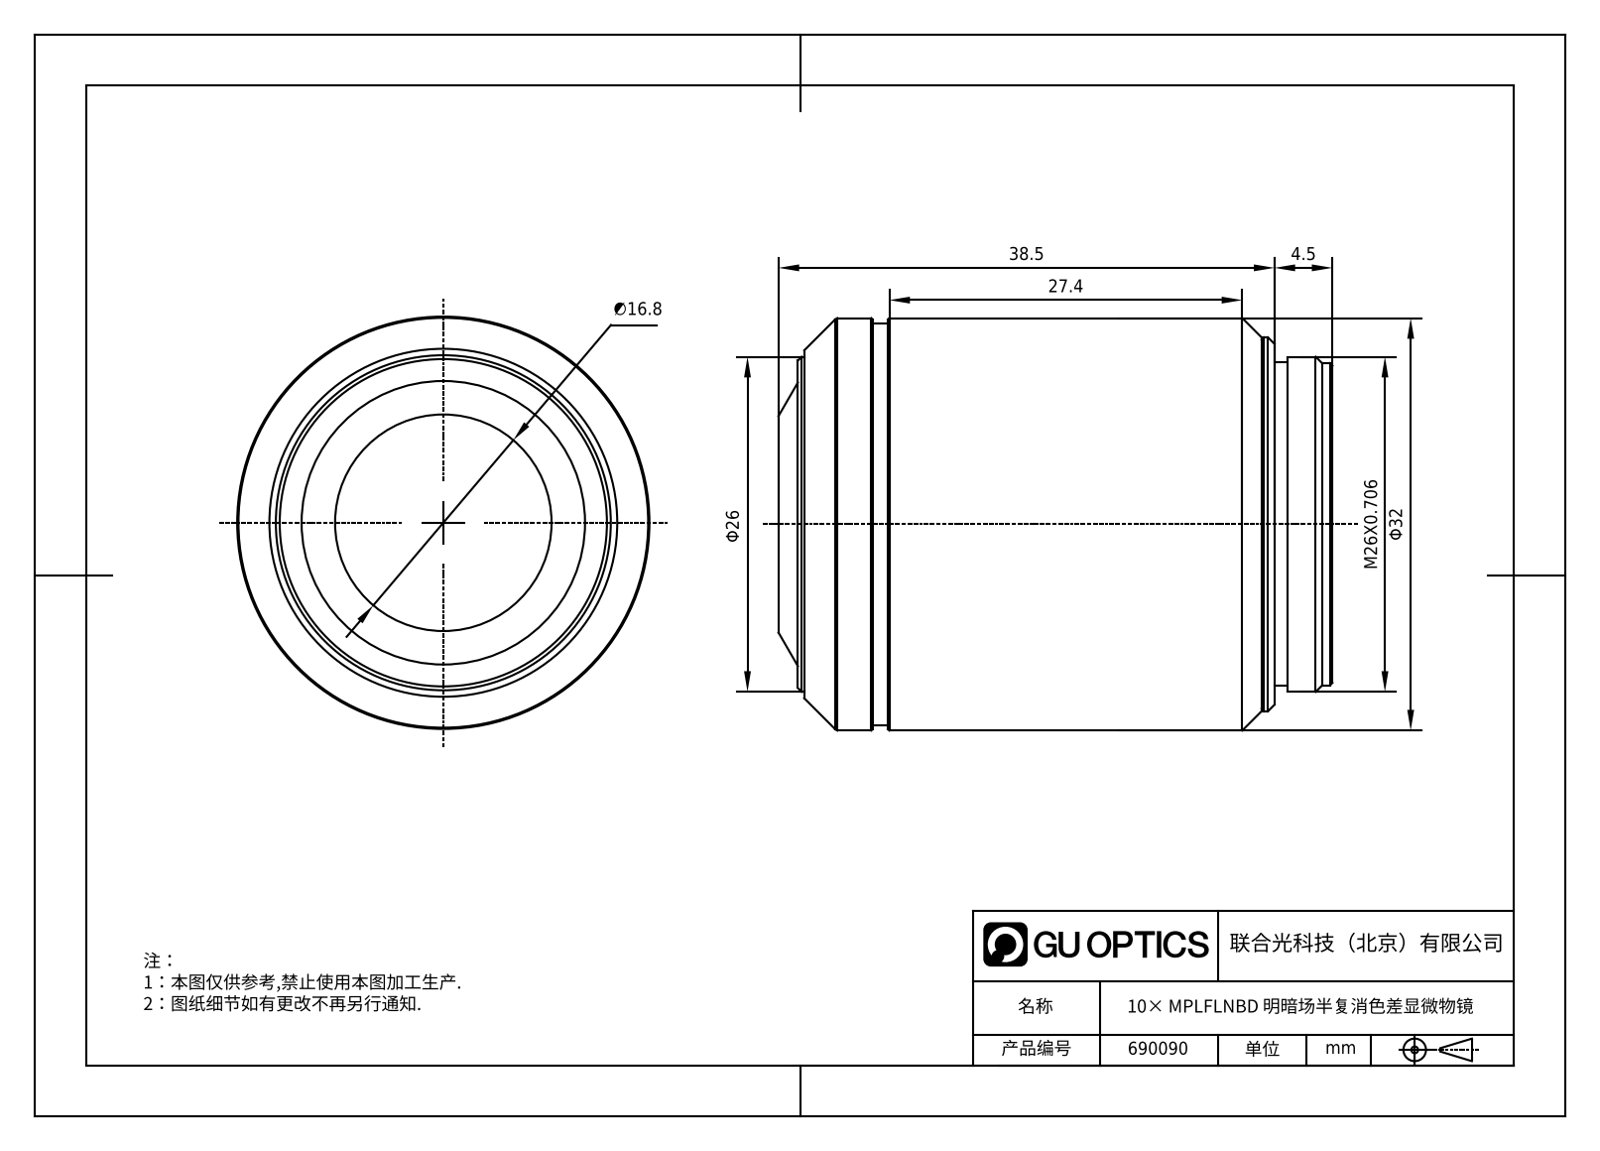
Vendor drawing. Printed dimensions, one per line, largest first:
38.5
Φ32
27.4
M26X0.706
Φ26
∅16.8
4.5
